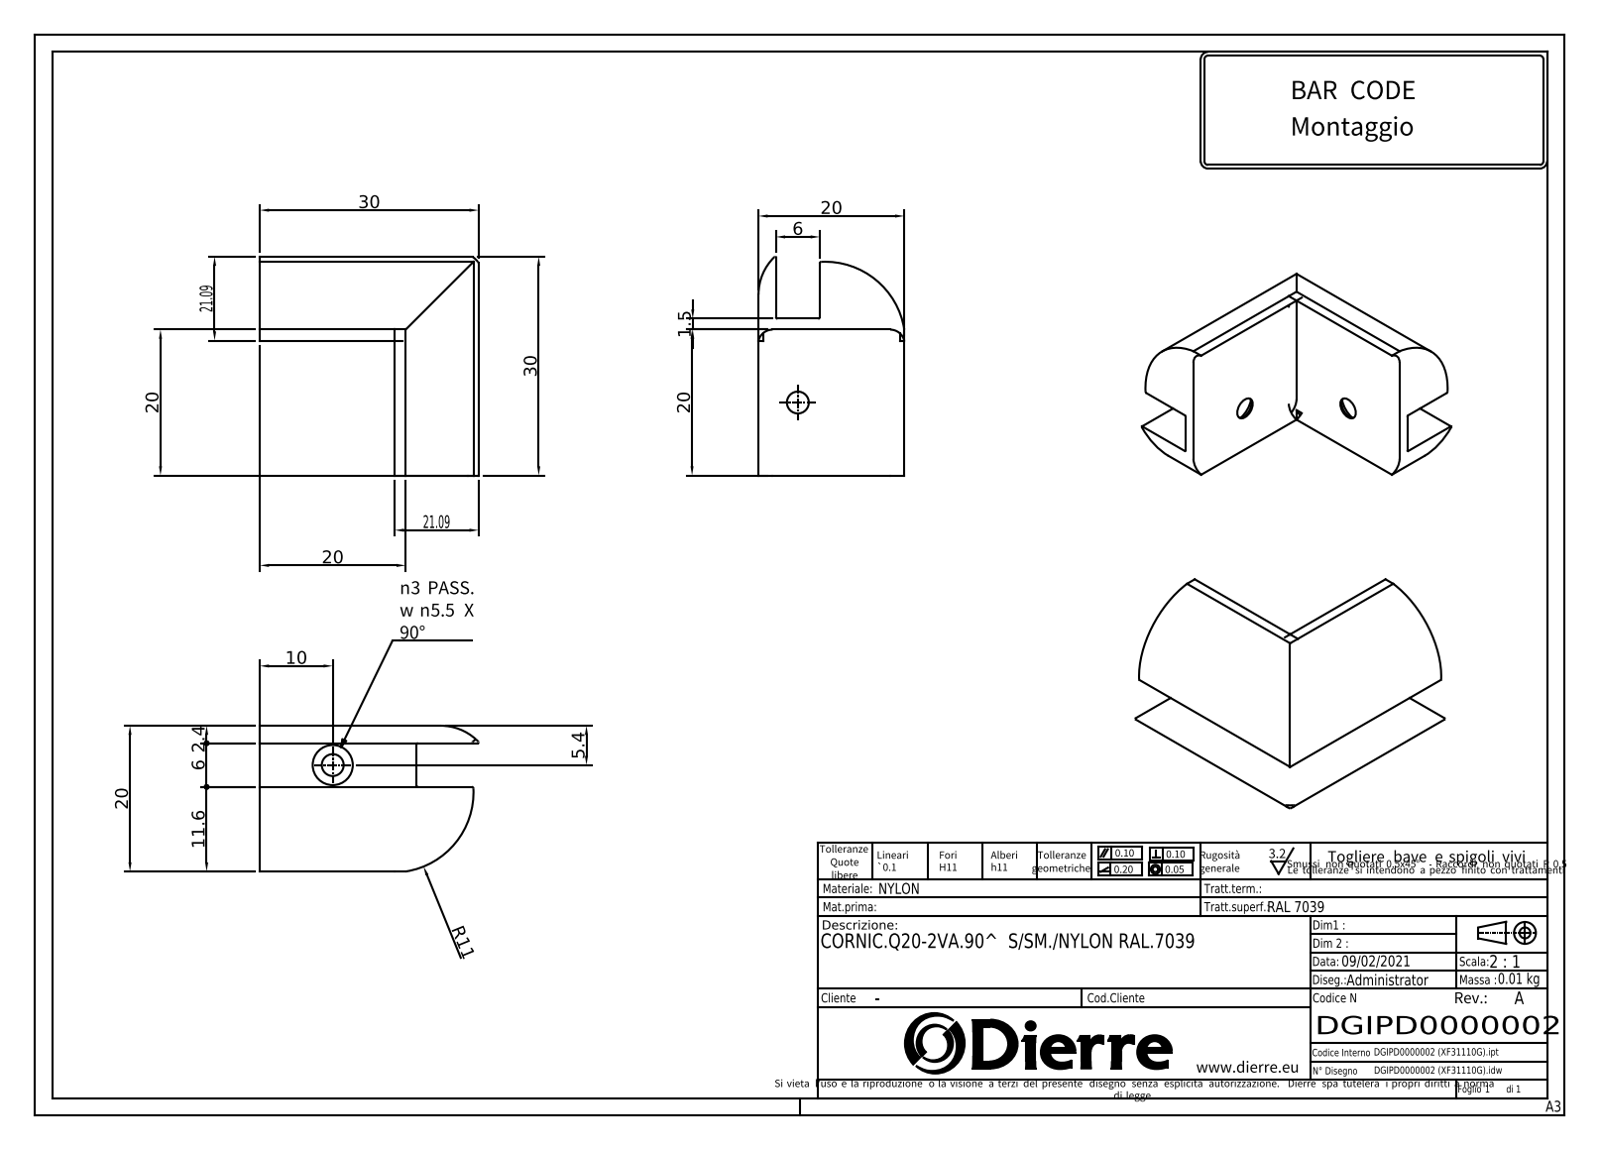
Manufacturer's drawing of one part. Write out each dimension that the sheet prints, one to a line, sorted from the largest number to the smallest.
30
30
21.09
21.09
20
20
20
20
20
11.6
R11
10
6
6
5.4
2.4
1.5
